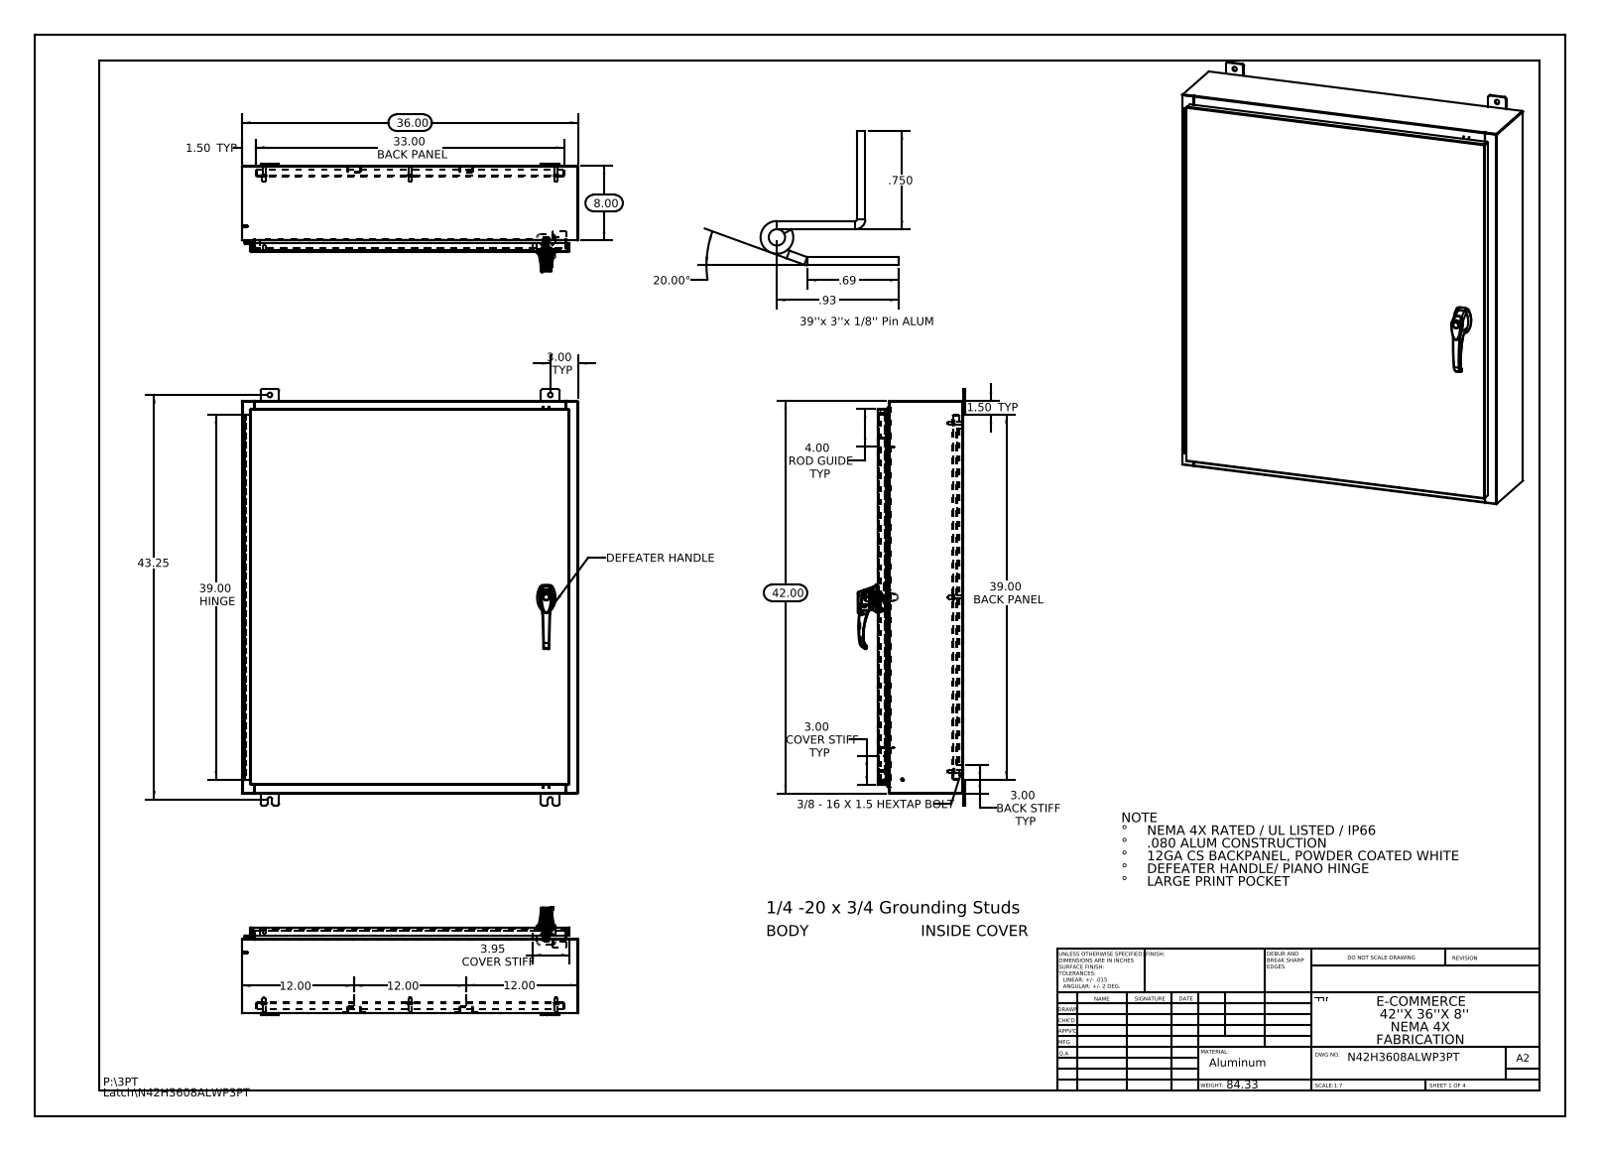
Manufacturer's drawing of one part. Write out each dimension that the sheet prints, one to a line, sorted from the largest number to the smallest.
43.25
42.00
39.00 HINGE
39.00 BACK PANEL
36.00
33.00 BACK PANEL
20.00°
12.00
12.00
12.00
8.00
4.00 ROD GUIDE TYP
3.95 COVER STIFF
3.00 TYP
3.00 BACK STIFF TYP
3.00 COVER STIFF TYP
1.50 TYP
1.50 TYP
.93
.750
.69
